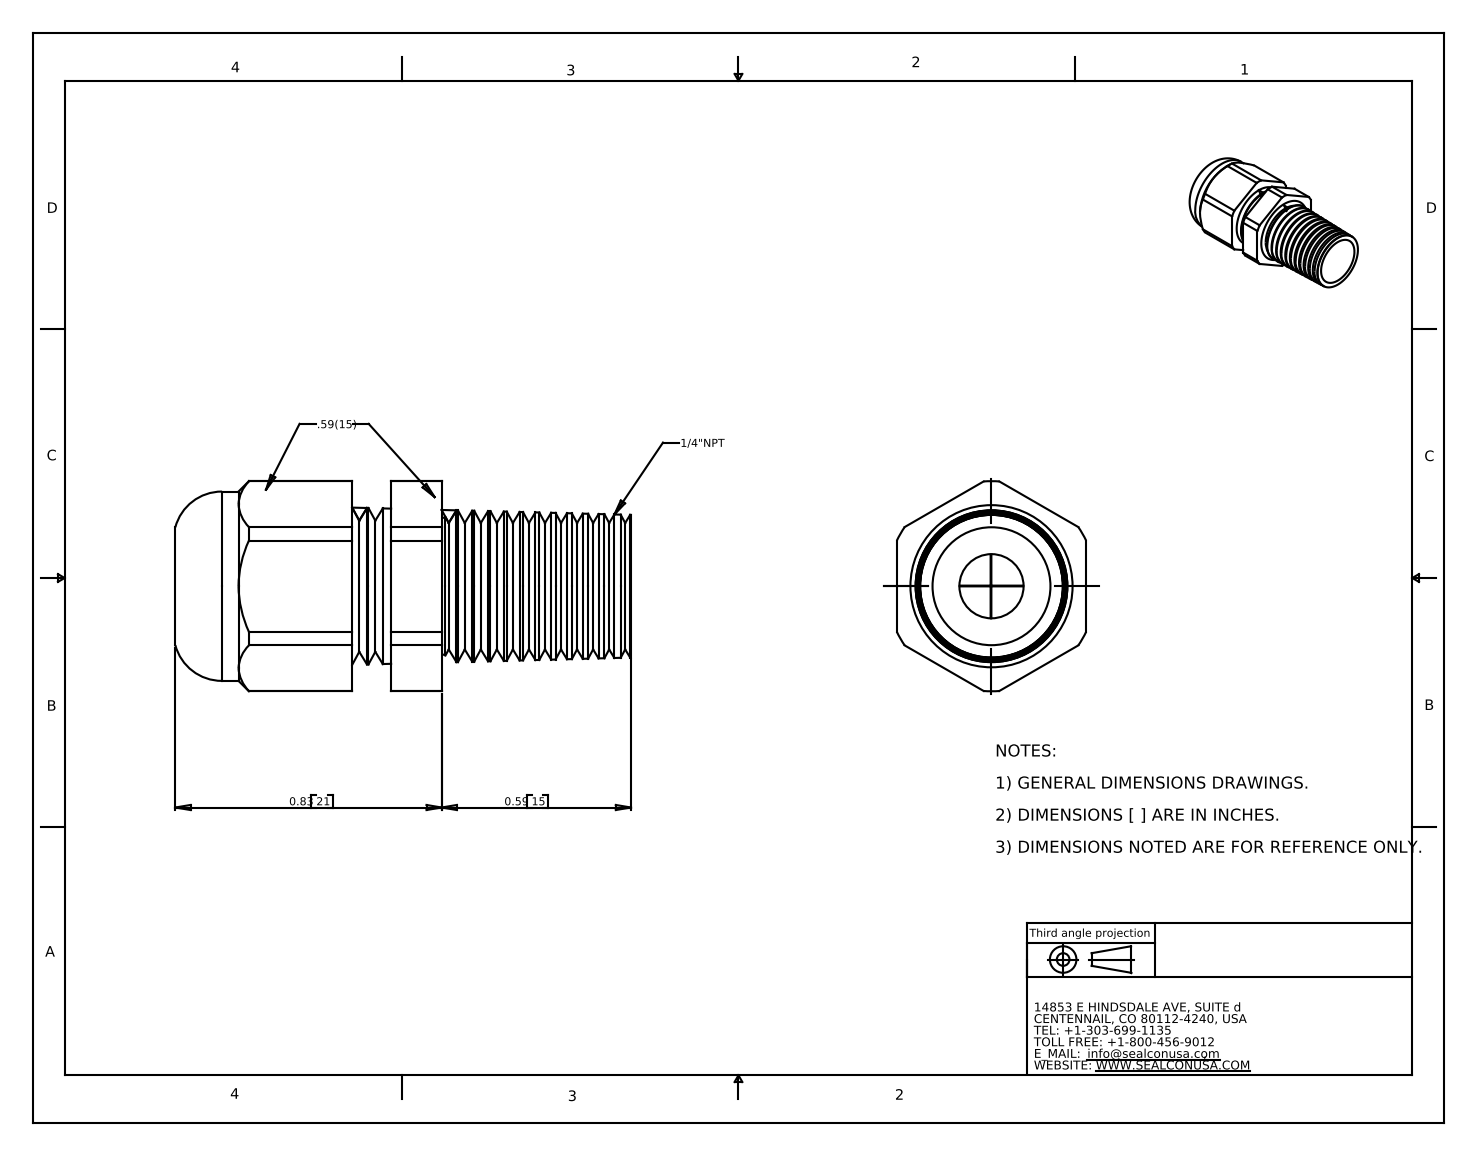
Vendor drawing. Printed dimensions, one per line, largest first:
0.83 21
0.59 15
